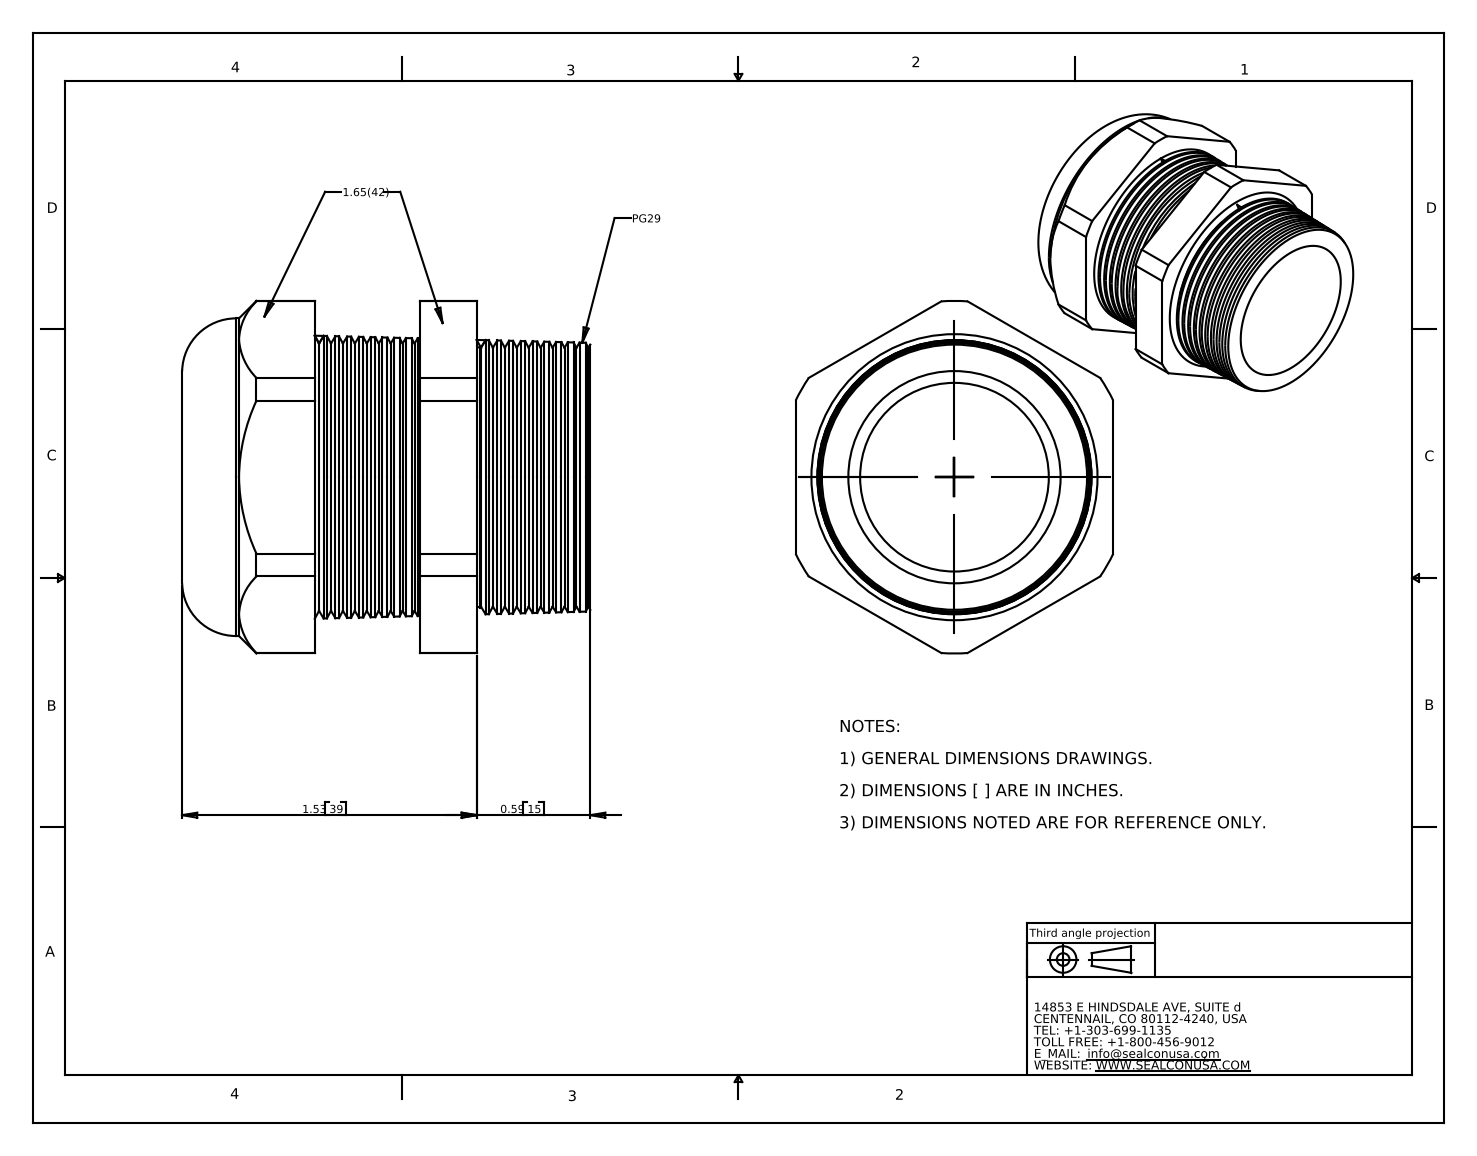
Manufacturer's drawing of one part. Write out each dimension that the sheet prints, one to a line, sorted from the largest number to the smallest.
1.53 39
0.59 15
